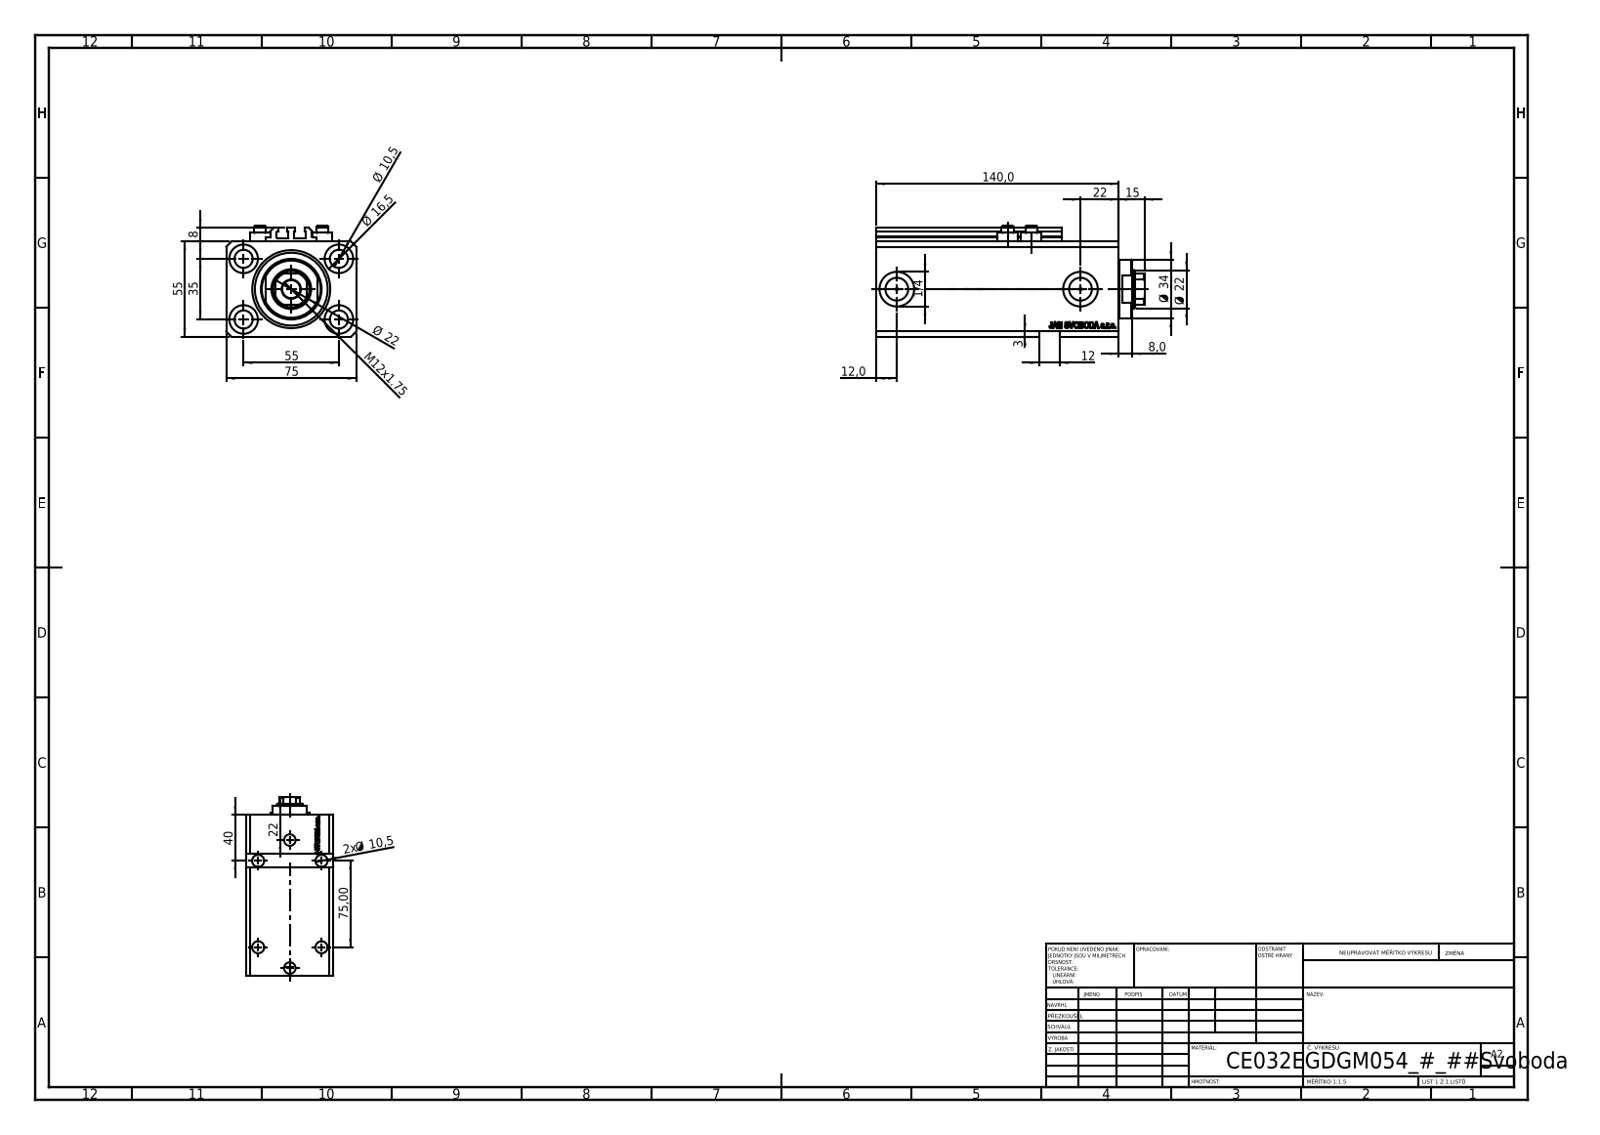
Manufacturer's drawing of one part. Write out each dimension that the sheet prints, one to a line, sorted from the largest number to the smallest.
140,0
75
75,00
55
55
40
35
Ø 34
Ø 22
22
Ø 22
22
Ø 16,5
15
M12x1.75
12,0
12
Ø 10,5
2x Ø 10,5
8
8,0
3
1/4
